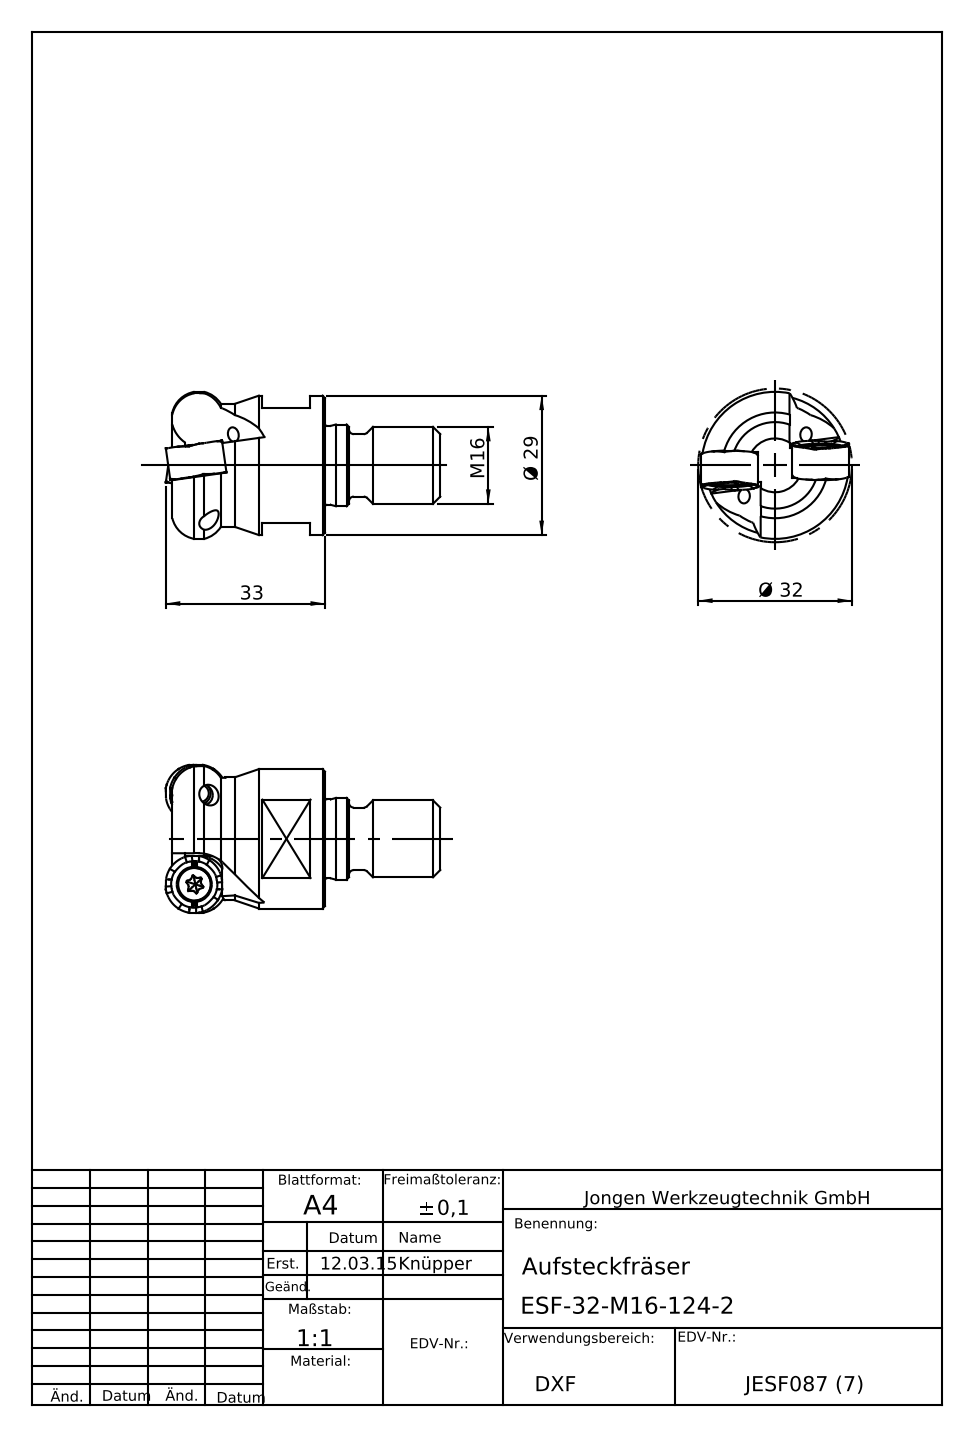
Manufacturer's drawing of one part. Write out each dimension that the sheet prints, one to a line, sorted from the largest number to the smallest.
33
Ø 32
Ø 29
M 16
